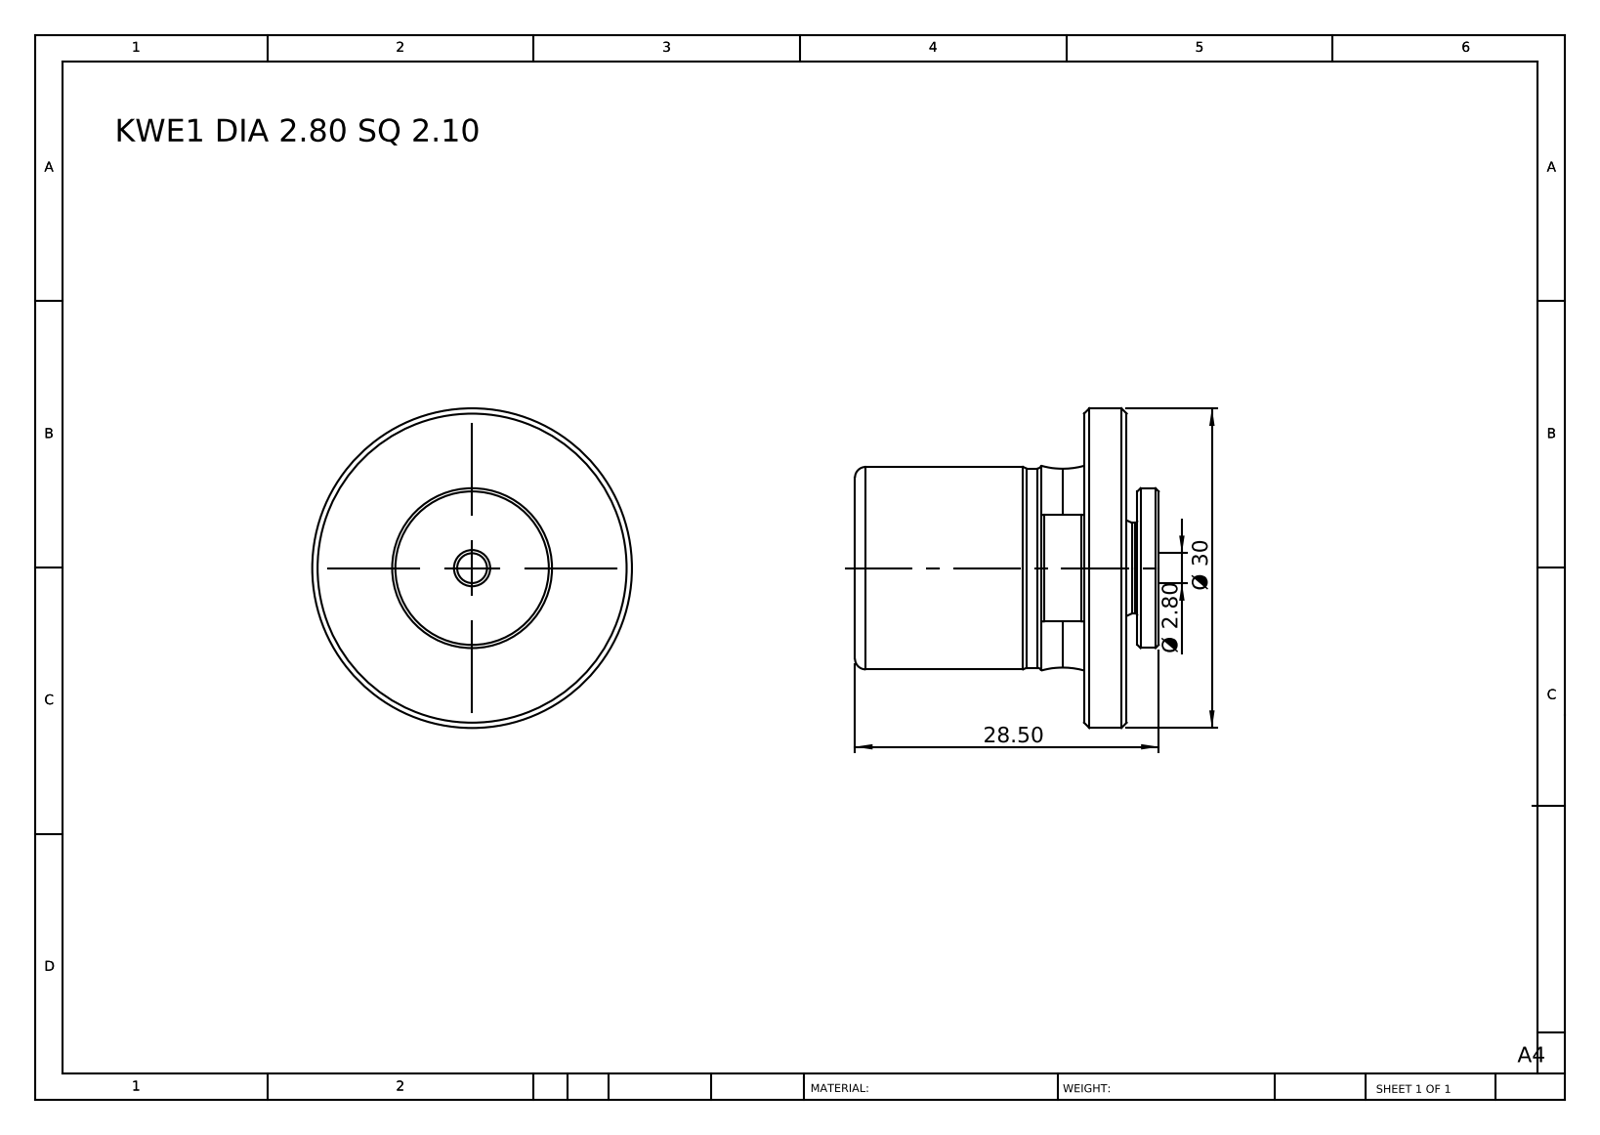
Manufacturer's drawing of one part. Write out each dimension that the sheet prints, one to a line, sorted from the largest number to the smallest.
Ø 30
28.50
Ø 2.80
